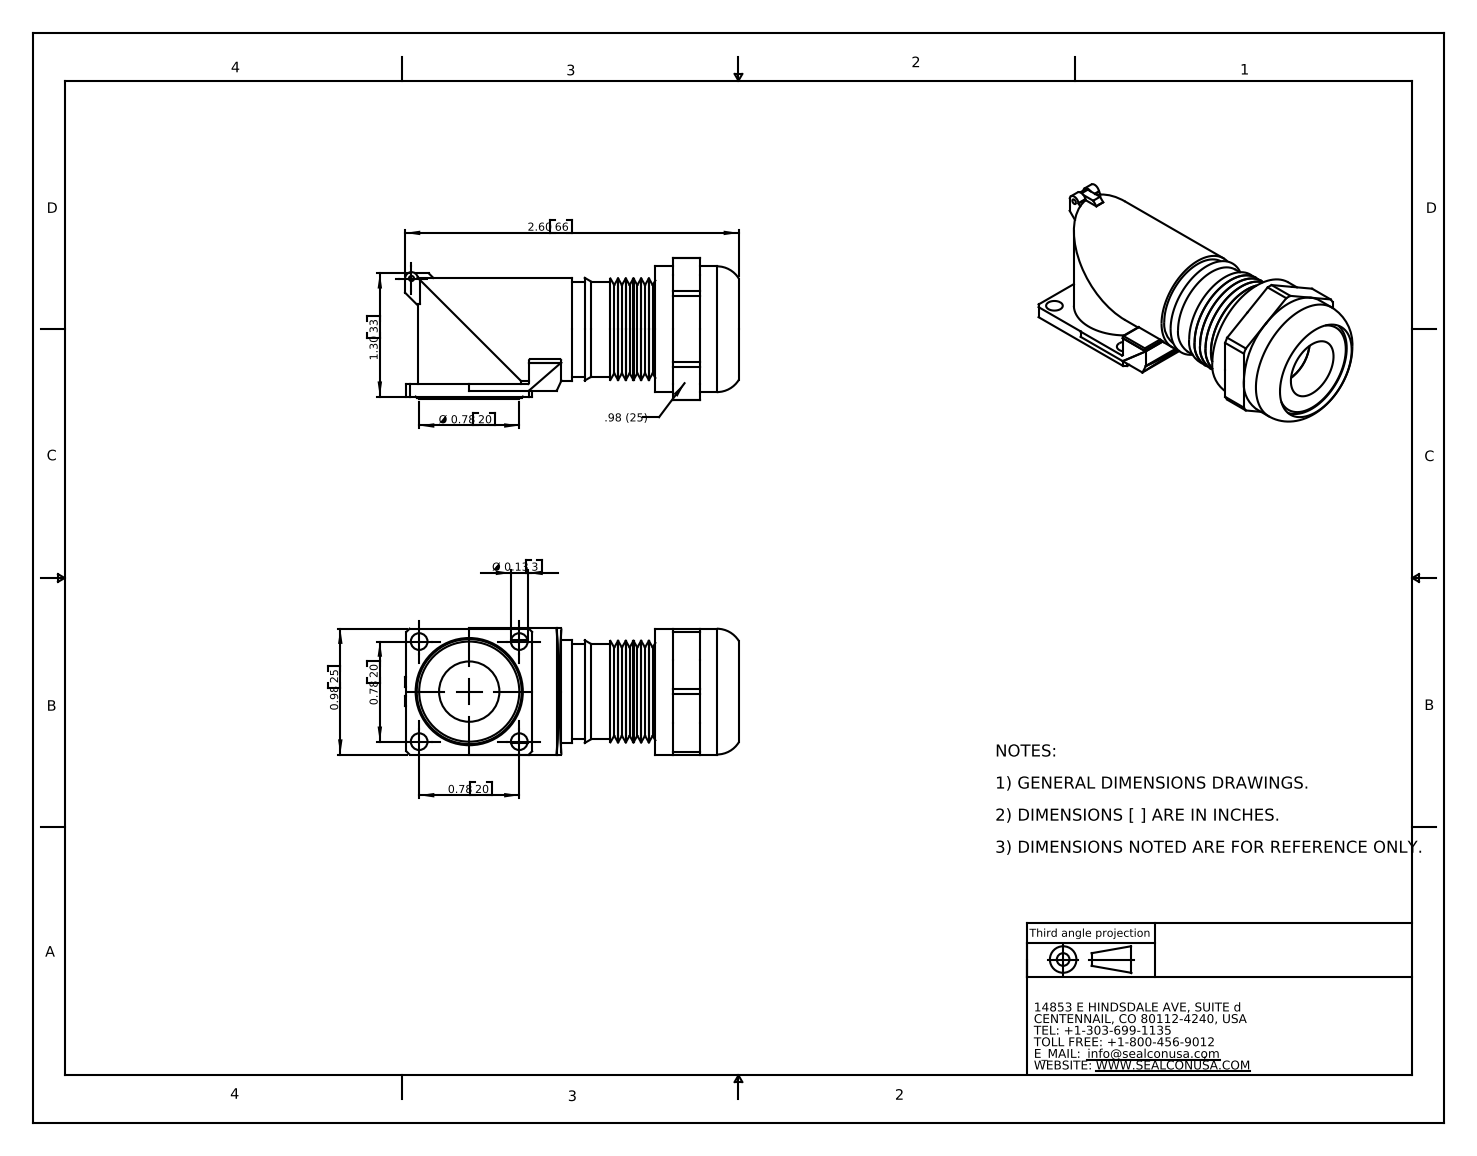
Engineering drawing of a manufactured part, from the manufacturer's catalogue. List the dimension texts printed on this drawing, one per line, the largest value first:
2.60 66
1.30 33
0.98 25
Ø 0.78 20
0.78 20
0.78 20
Ø 0.13 3
